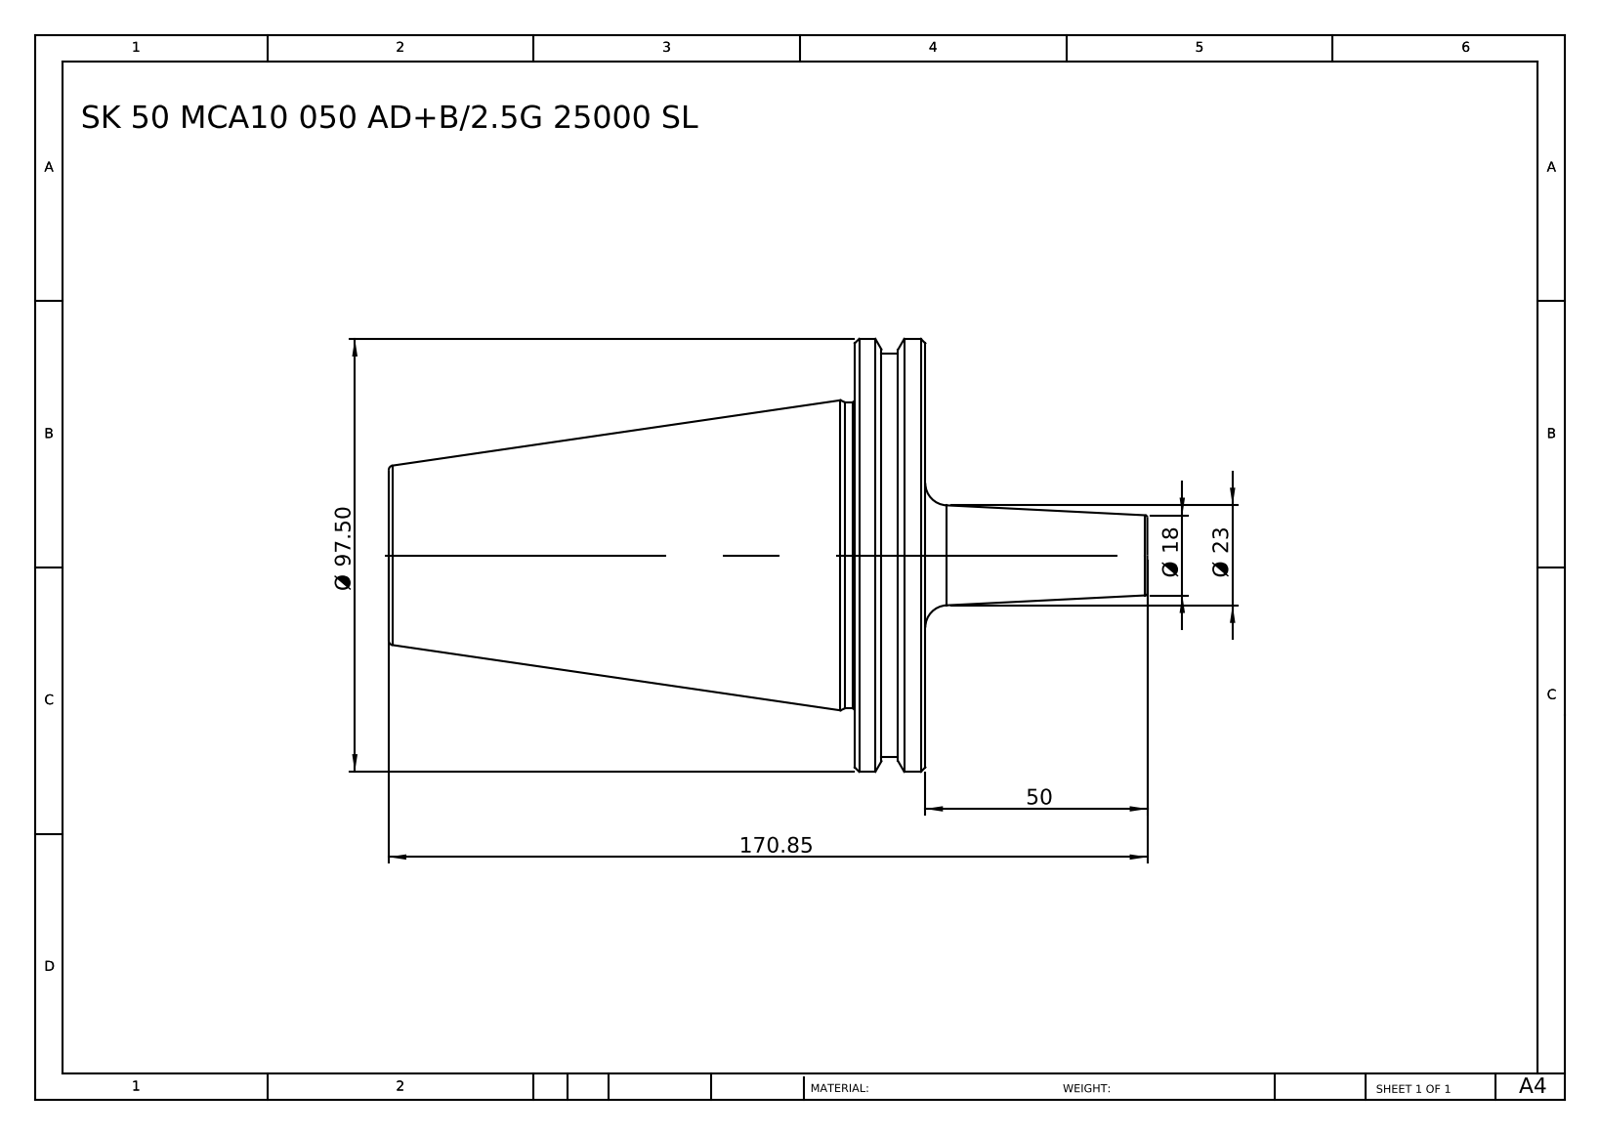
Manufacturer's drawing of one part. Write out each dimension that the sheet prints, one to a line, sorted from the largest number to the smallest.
170.85
Ø 97.50
50
Ø 23
Ø 18
